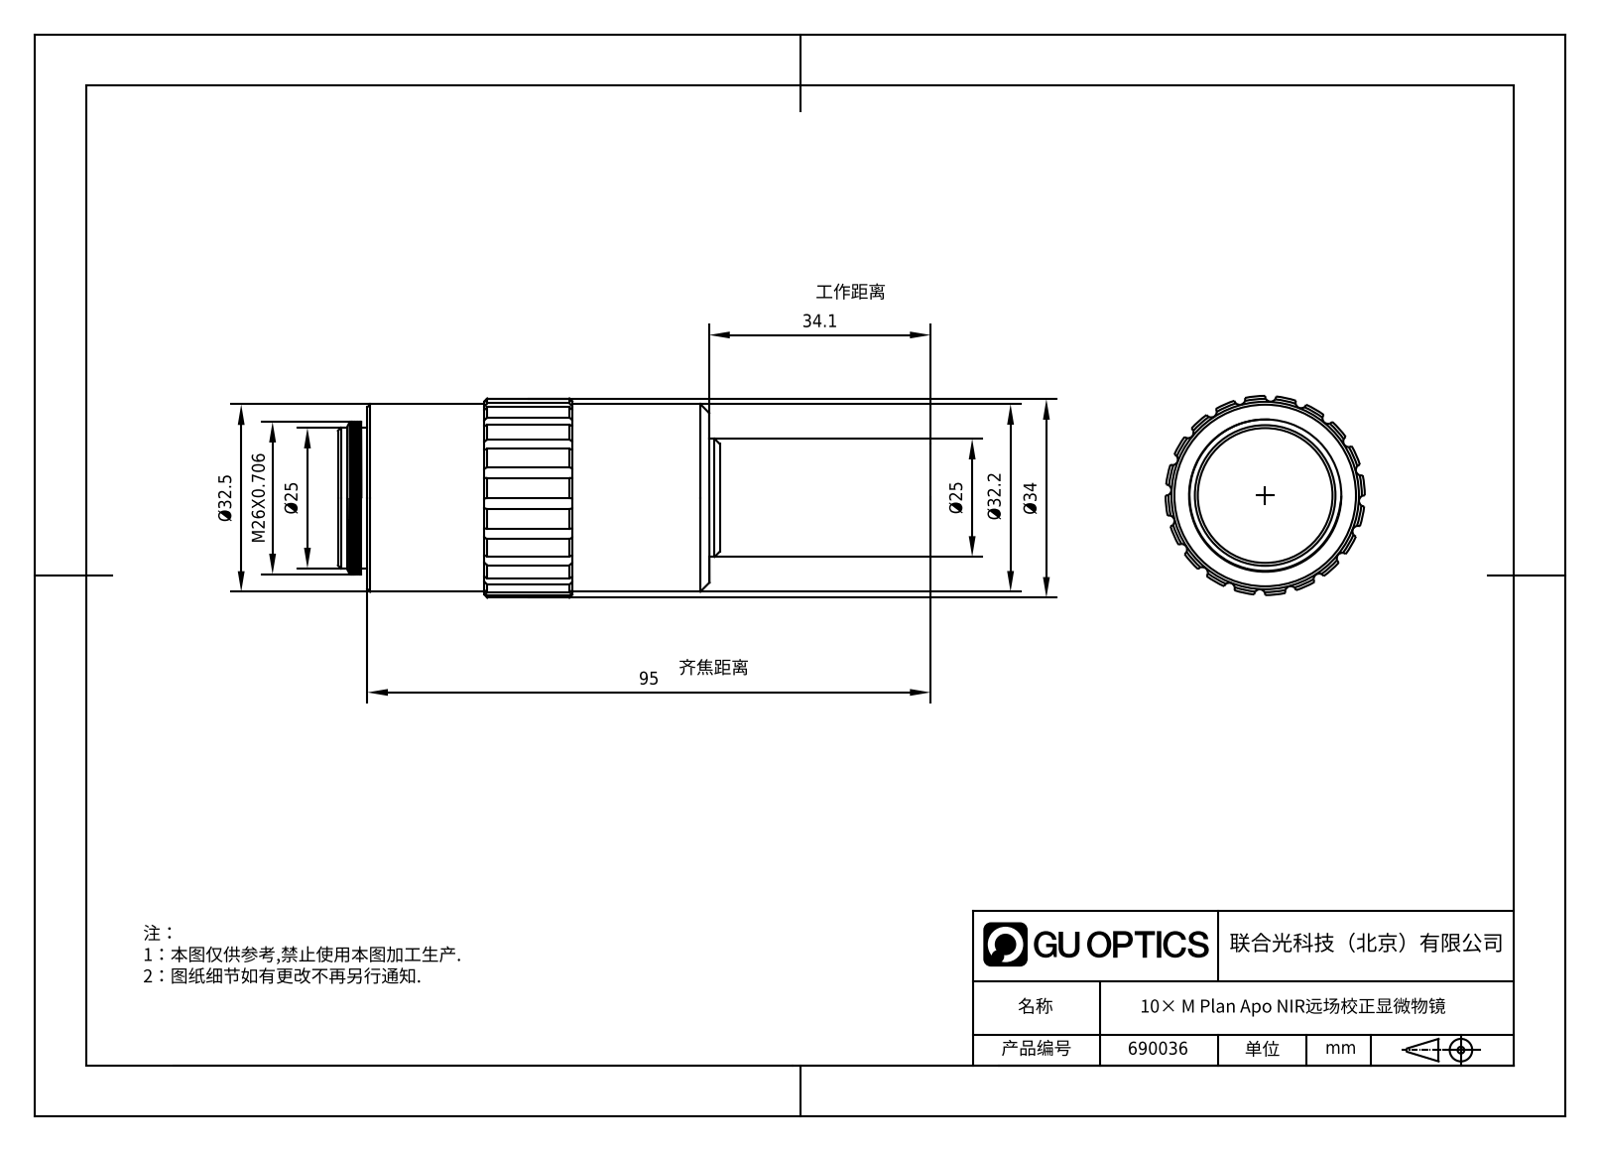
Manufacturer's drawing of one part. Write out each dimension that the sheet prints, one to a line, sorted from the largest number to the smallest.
95
34.1
Ø34
Ø32.5
Ø32.2
M26X0.706
Ø25
Ø25
